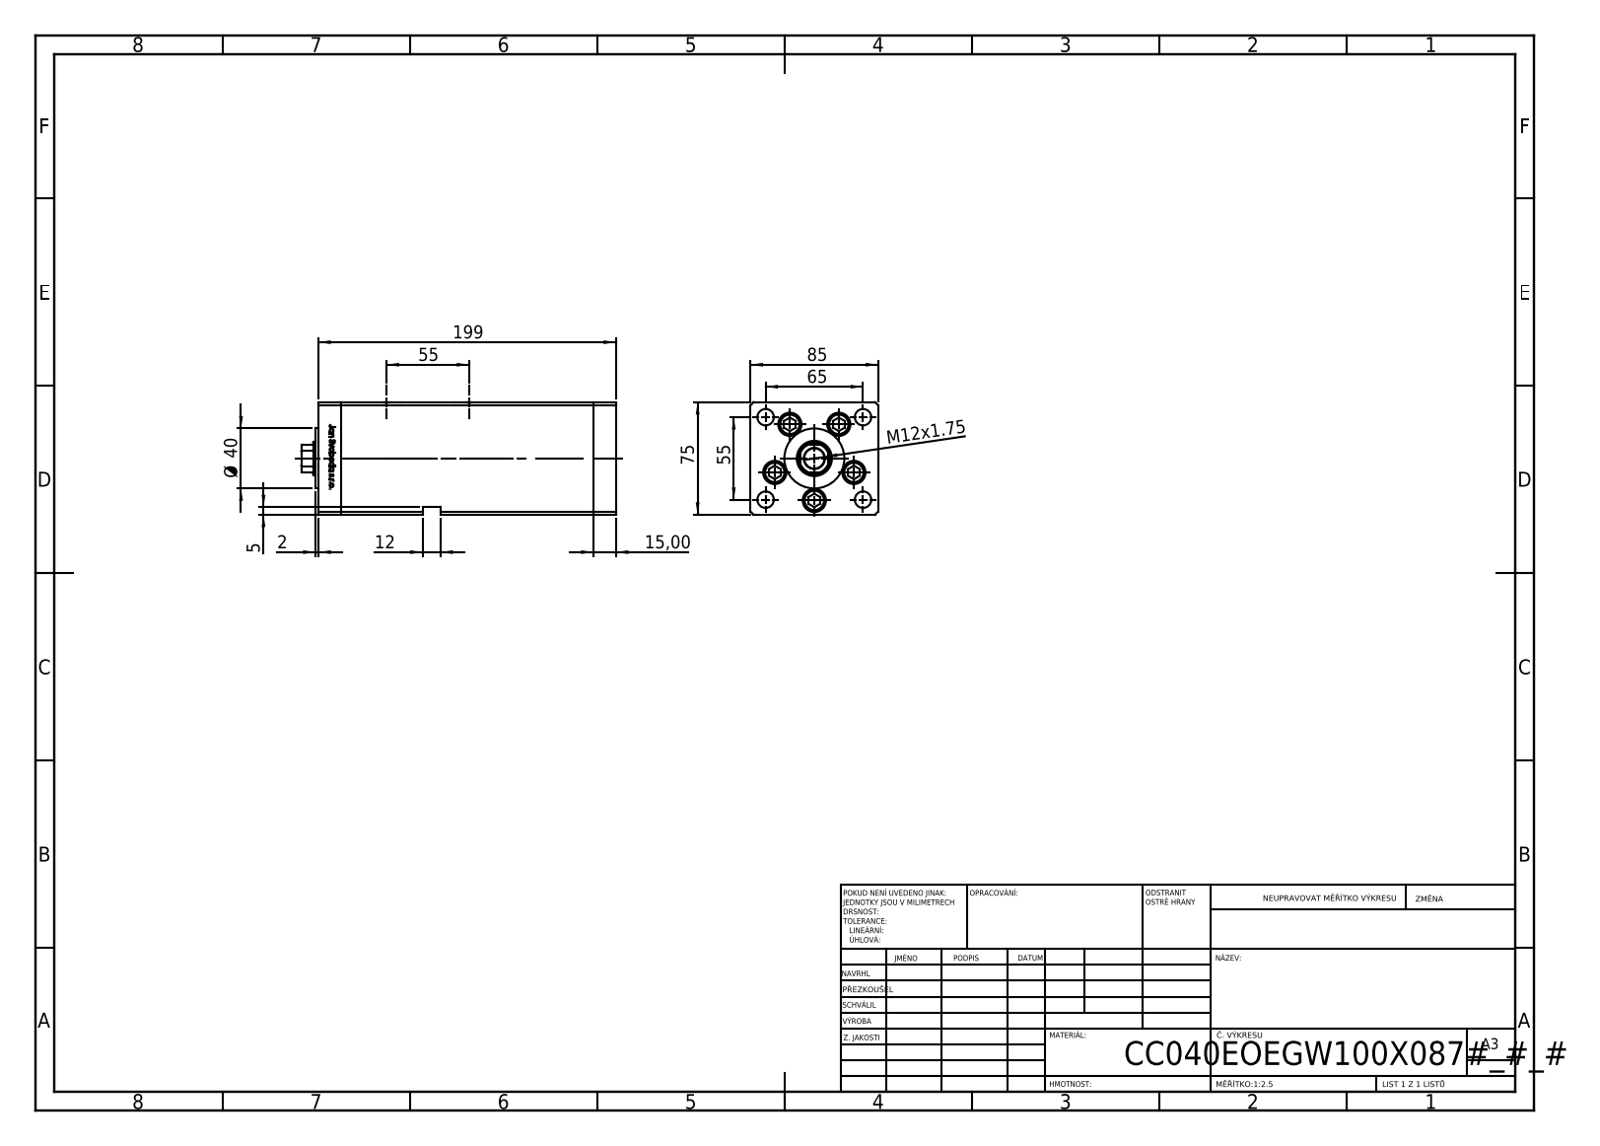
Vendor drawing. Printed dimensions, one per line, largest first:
199
85
75
65
55
55
Ø 40
15,00
12
M12x1.75
5
2
